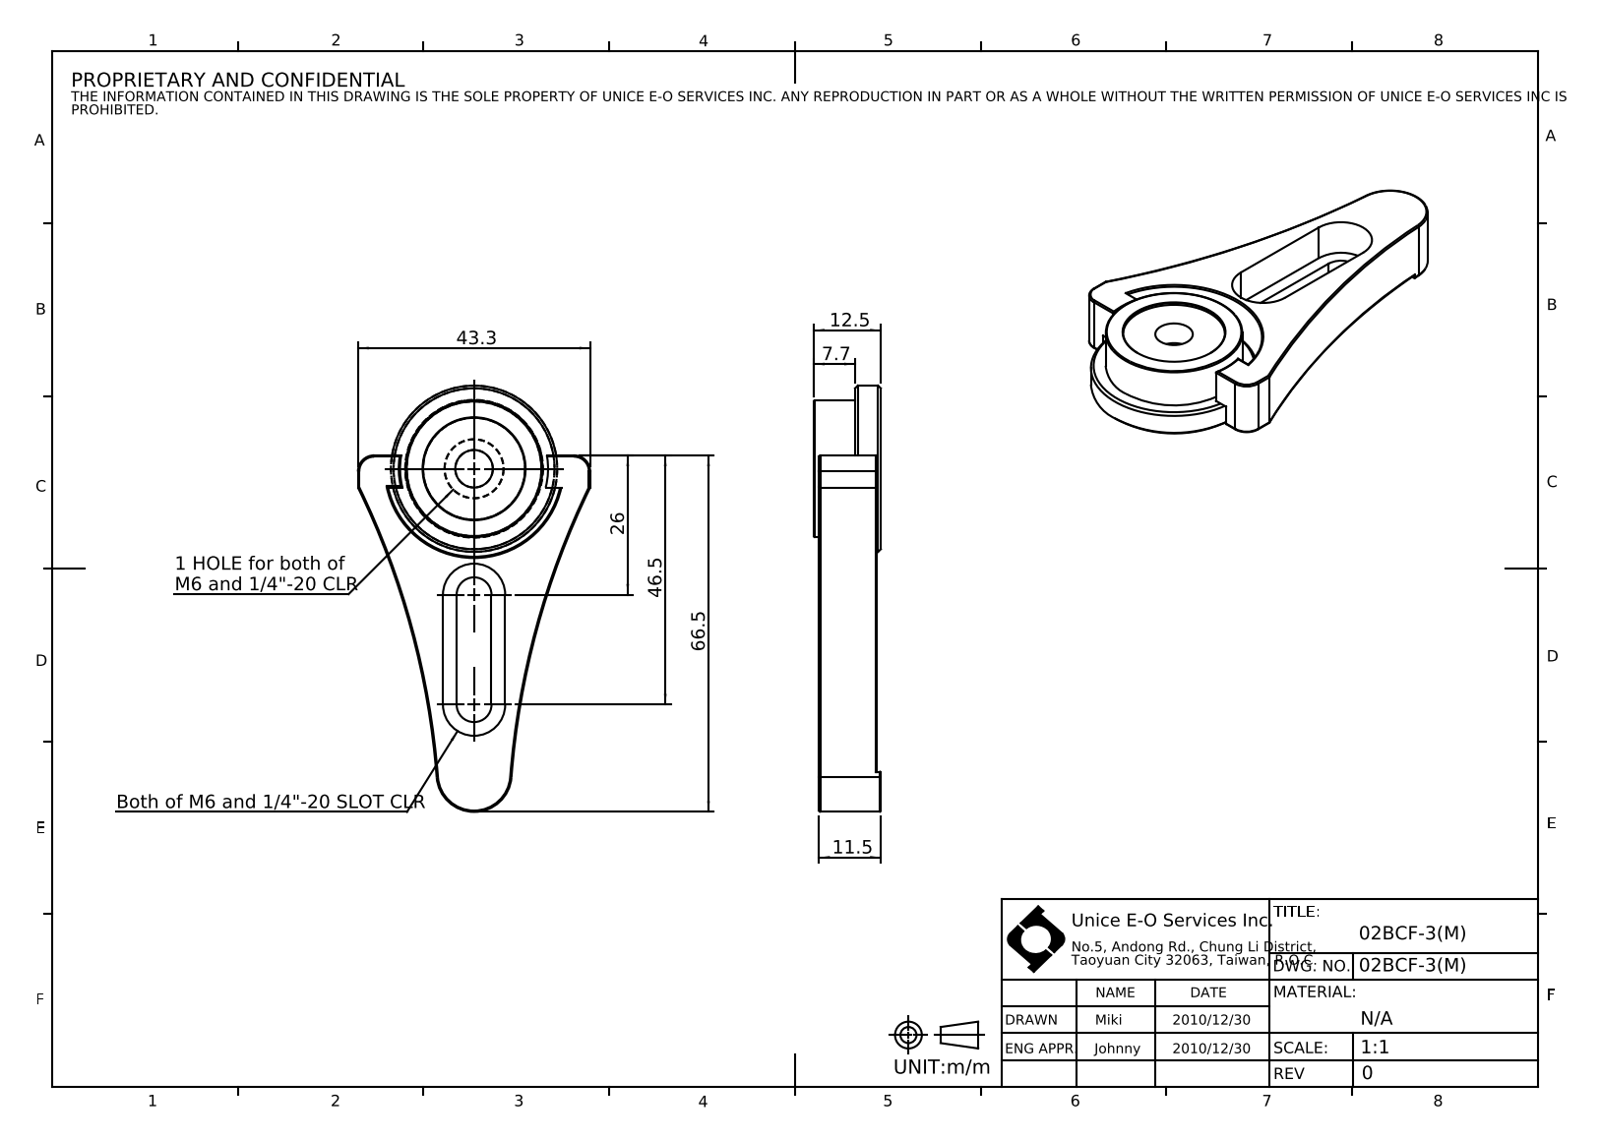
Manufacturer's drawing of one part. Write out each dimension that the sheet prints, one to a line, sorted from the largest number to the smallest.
66.5
46.5
43.3
26
12.5
11.5
7.7
Both of M6 and 1/4"-20 SLOT CLR
1 HOLE for both of M6 and 1/4"-20 CLR
